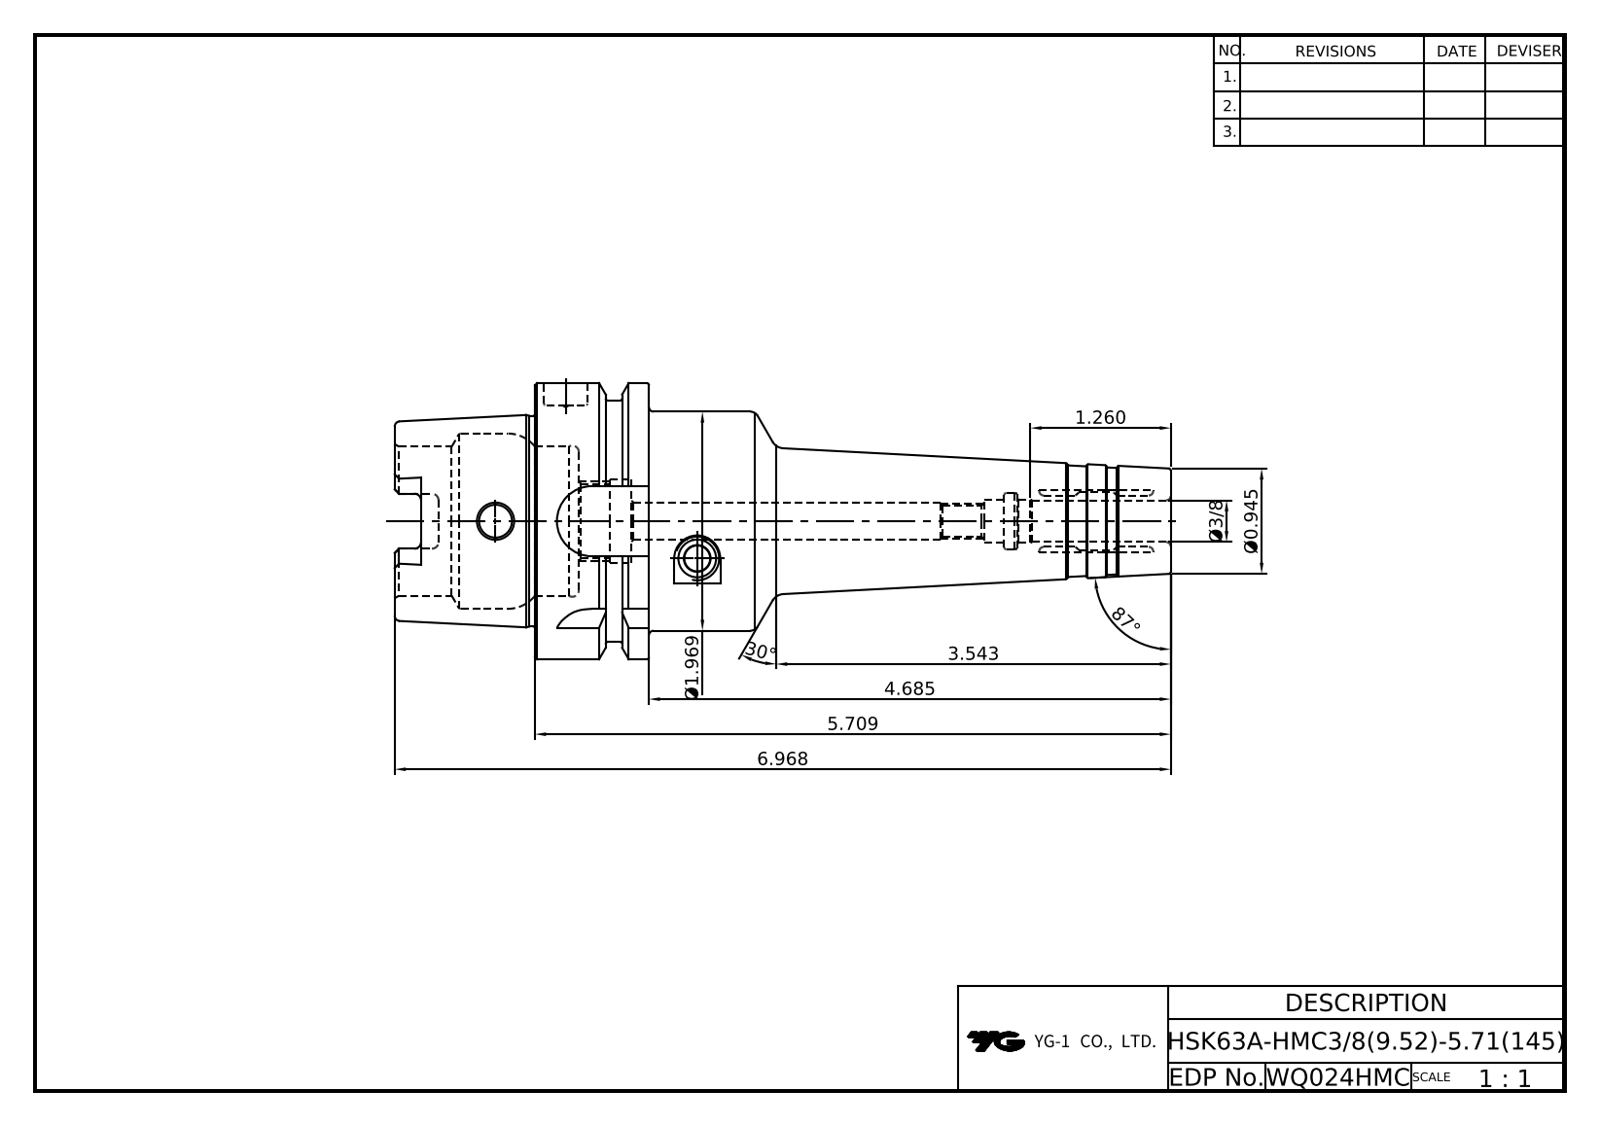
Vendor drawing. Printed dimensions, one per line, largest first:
87°
30°
6.968
5.709
4.685
3.543
Ø1.969
1.260
Ø0.945
Ø3/8
